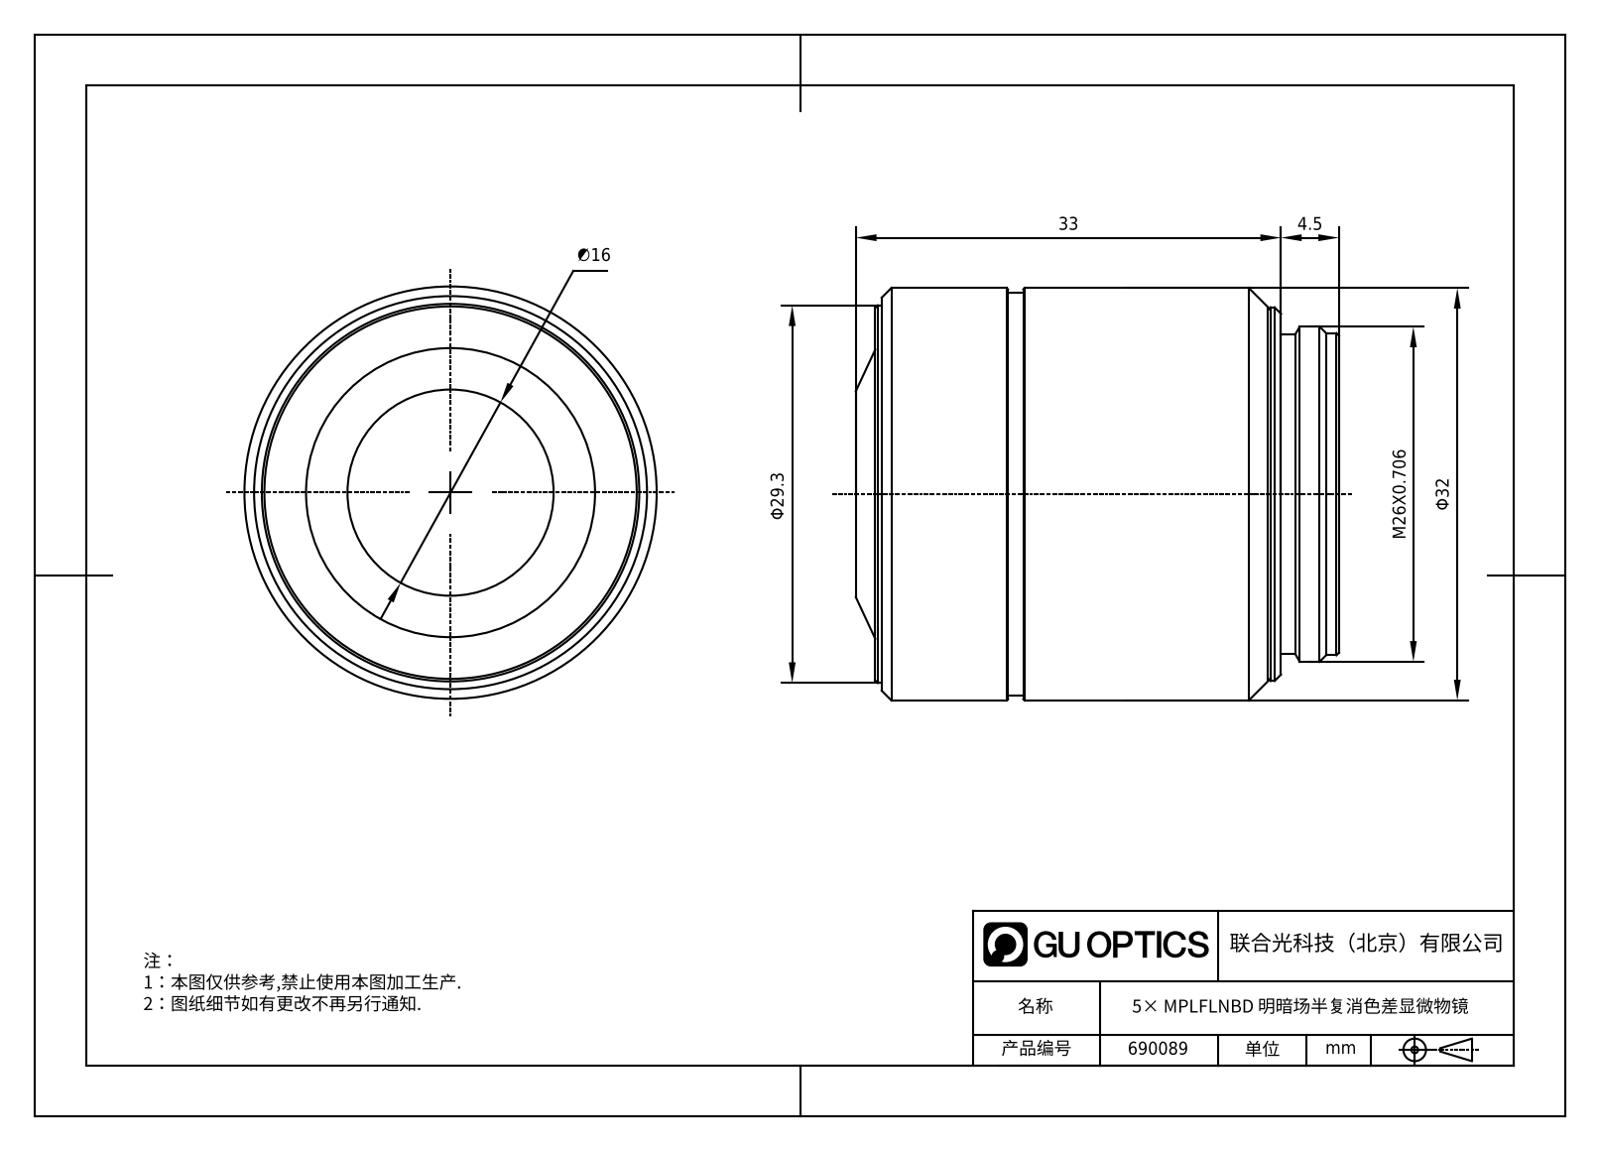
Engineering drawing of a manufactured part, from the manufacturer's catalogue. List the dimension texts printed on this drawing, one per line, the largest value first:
33
Φ32
Φ29.3
M26X0.706
∅16
4.5
